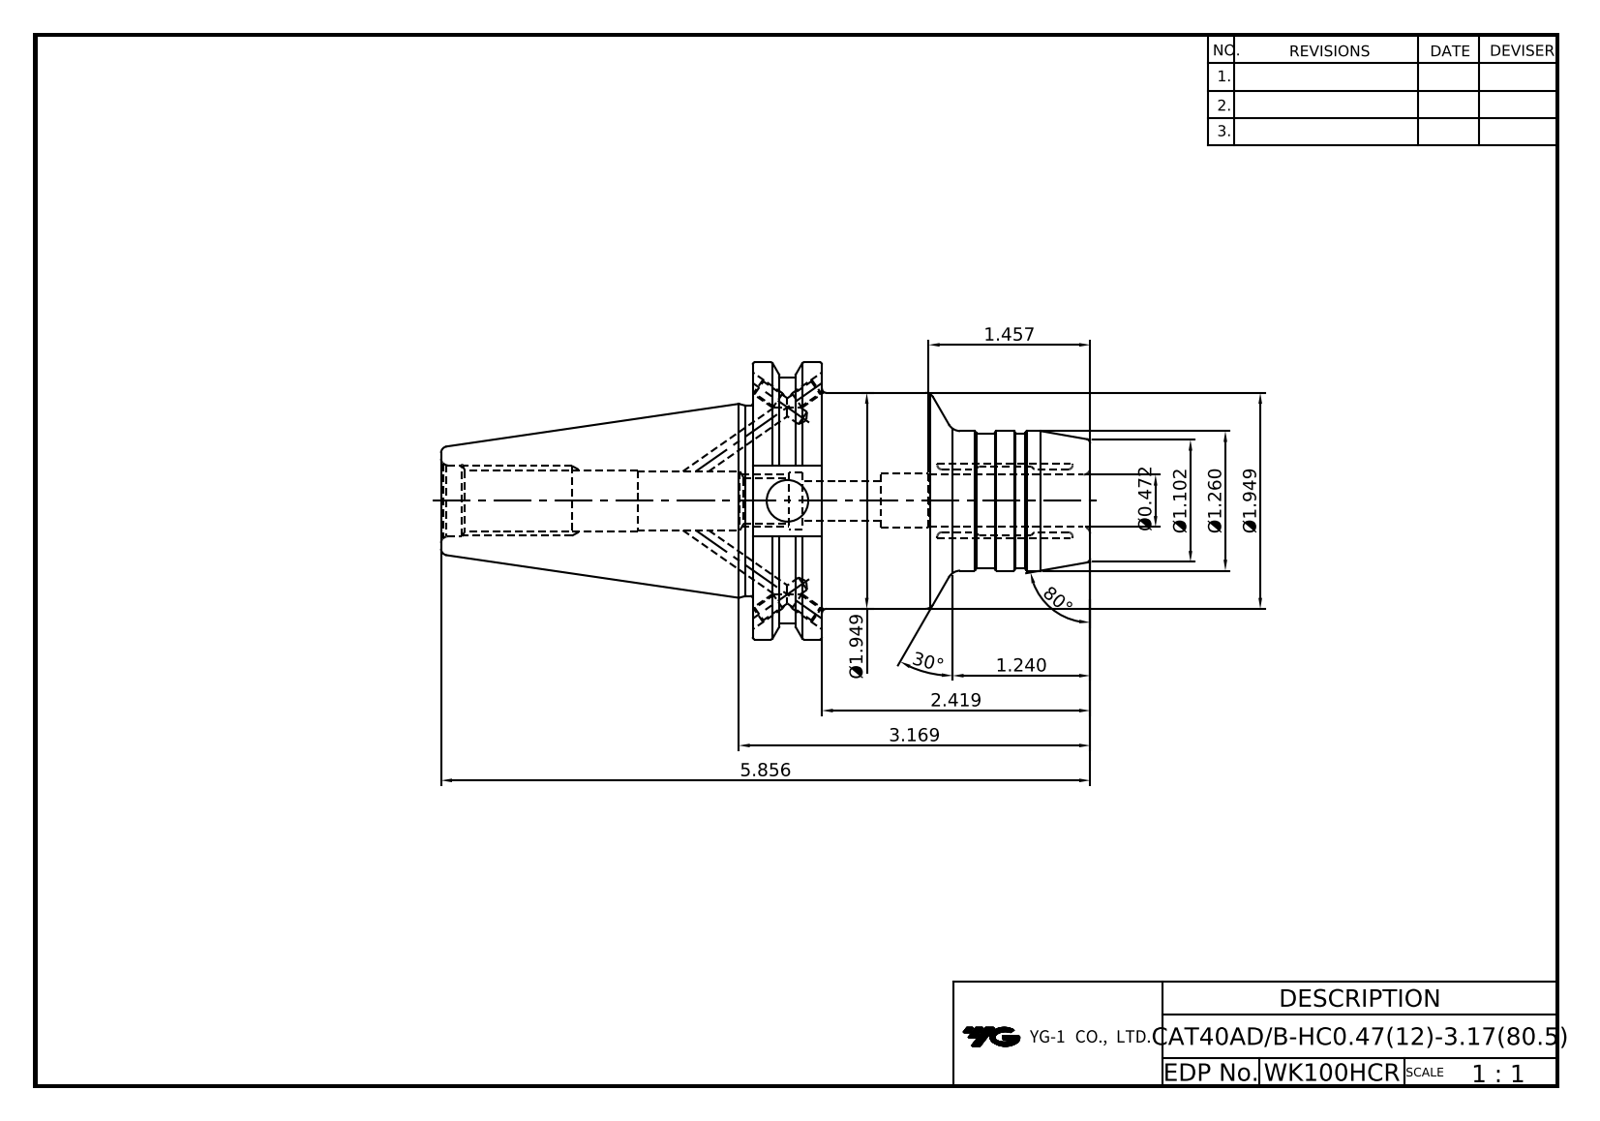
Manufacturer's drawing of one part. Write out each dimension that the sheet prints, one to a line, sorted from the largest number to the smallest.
80°
30°
5.856
3.169
2.419
Ø1.949
Ø1.949
1.457
Ø1.260
1.240
Ø1.102
Ø0.472
